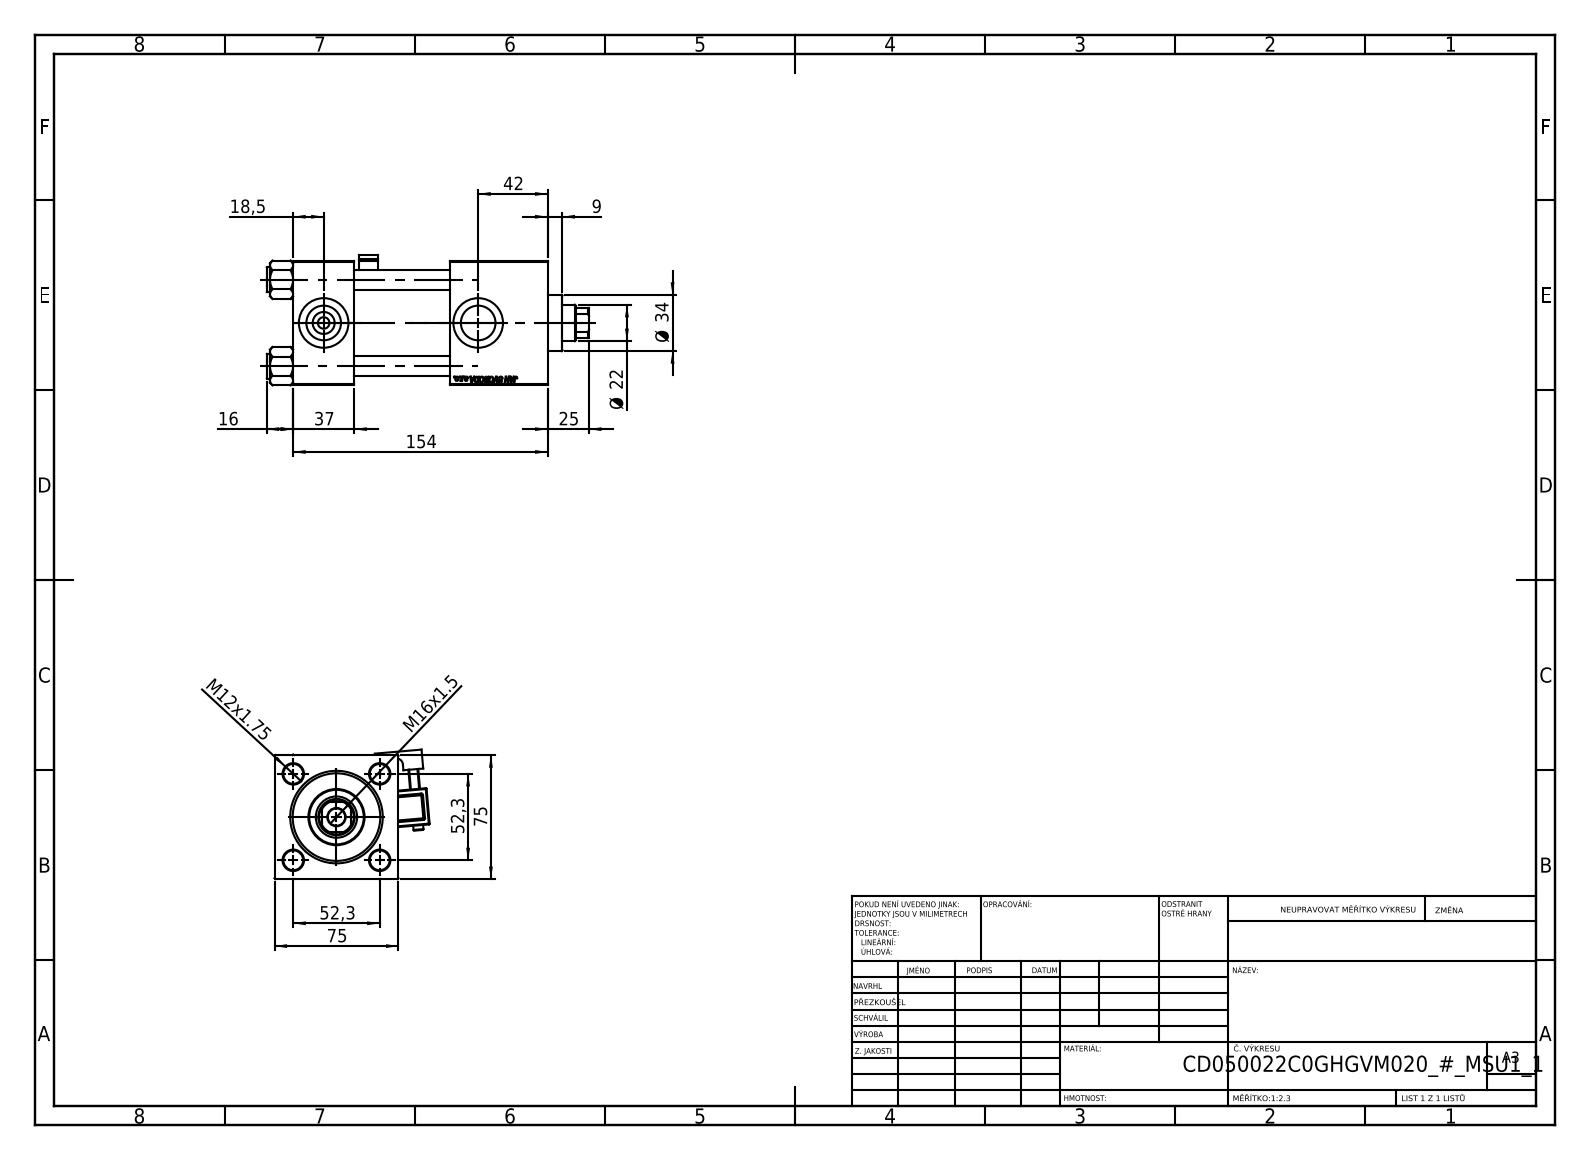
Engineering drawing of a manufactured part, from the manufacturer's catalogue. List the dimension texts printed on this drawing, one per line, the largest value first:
154
75
75
52,3
52,3
42
37
Ø 34
25
Ø 22
18,5
16
M16x1.5
M12x1.75
9
